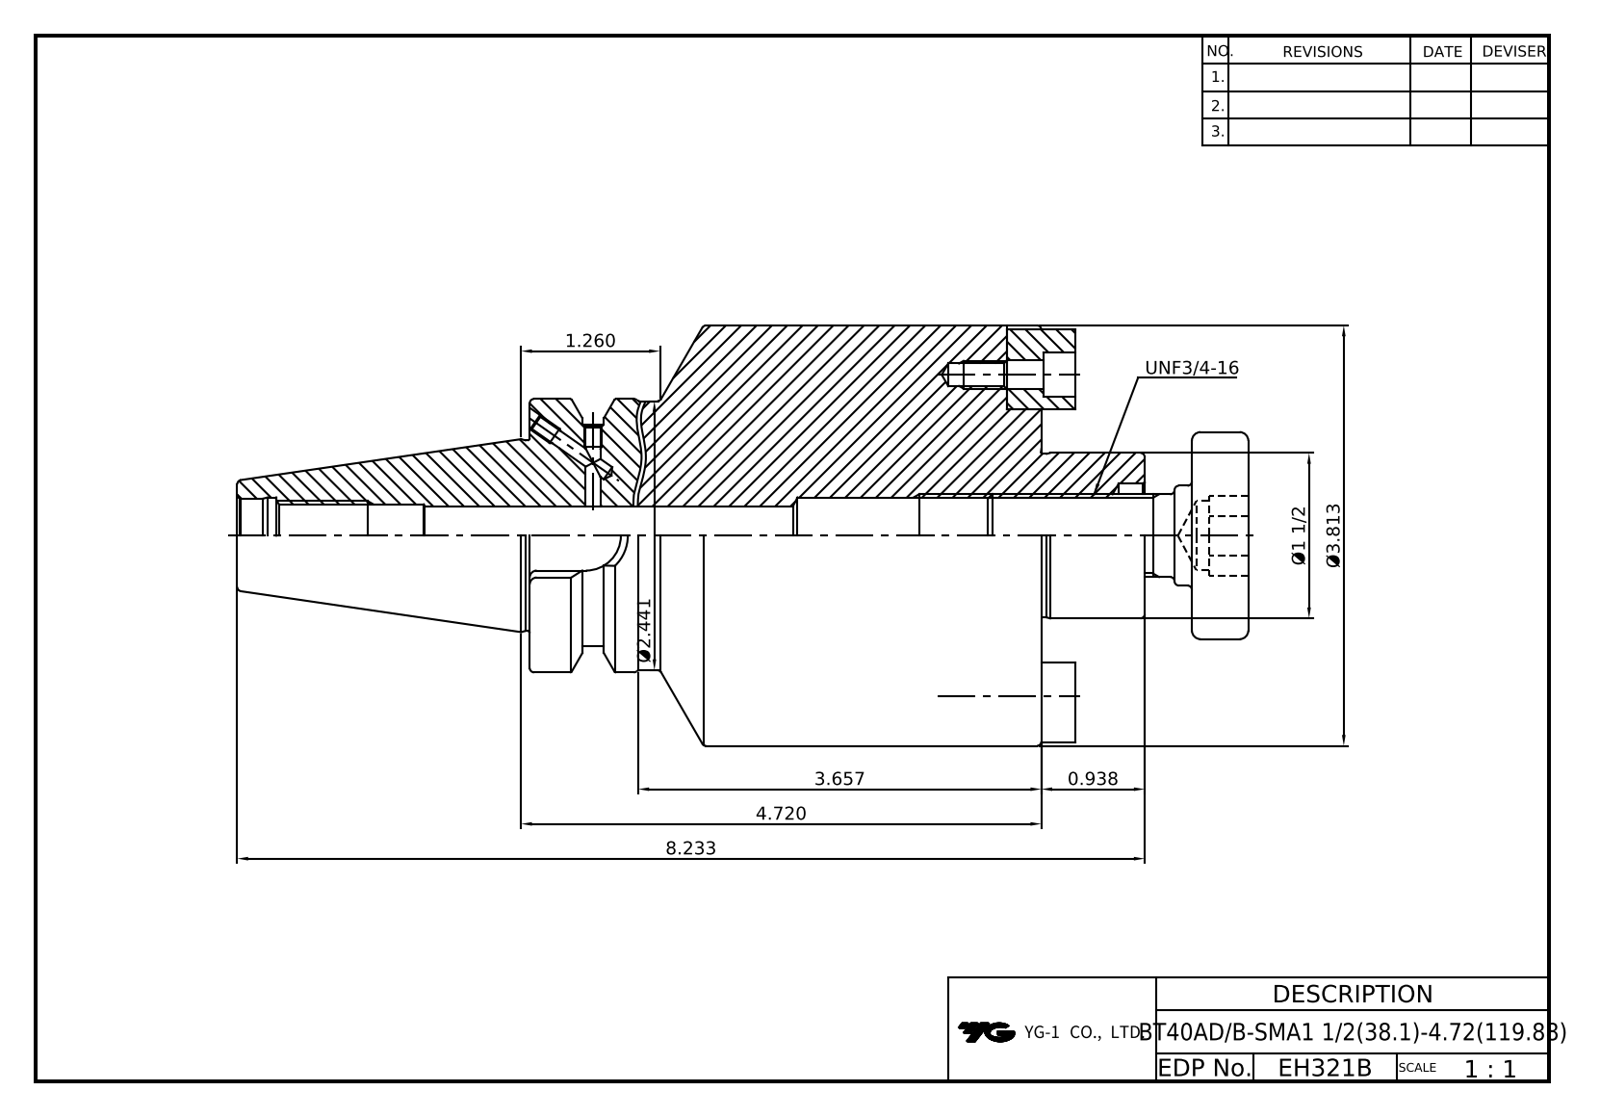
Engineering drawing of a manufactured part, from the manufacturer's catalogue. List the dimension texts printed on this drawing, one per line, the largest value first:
8.233
4.720
Ø3.813
3.657
Ø2.441
Ø1 1/2
1.260
0.938
